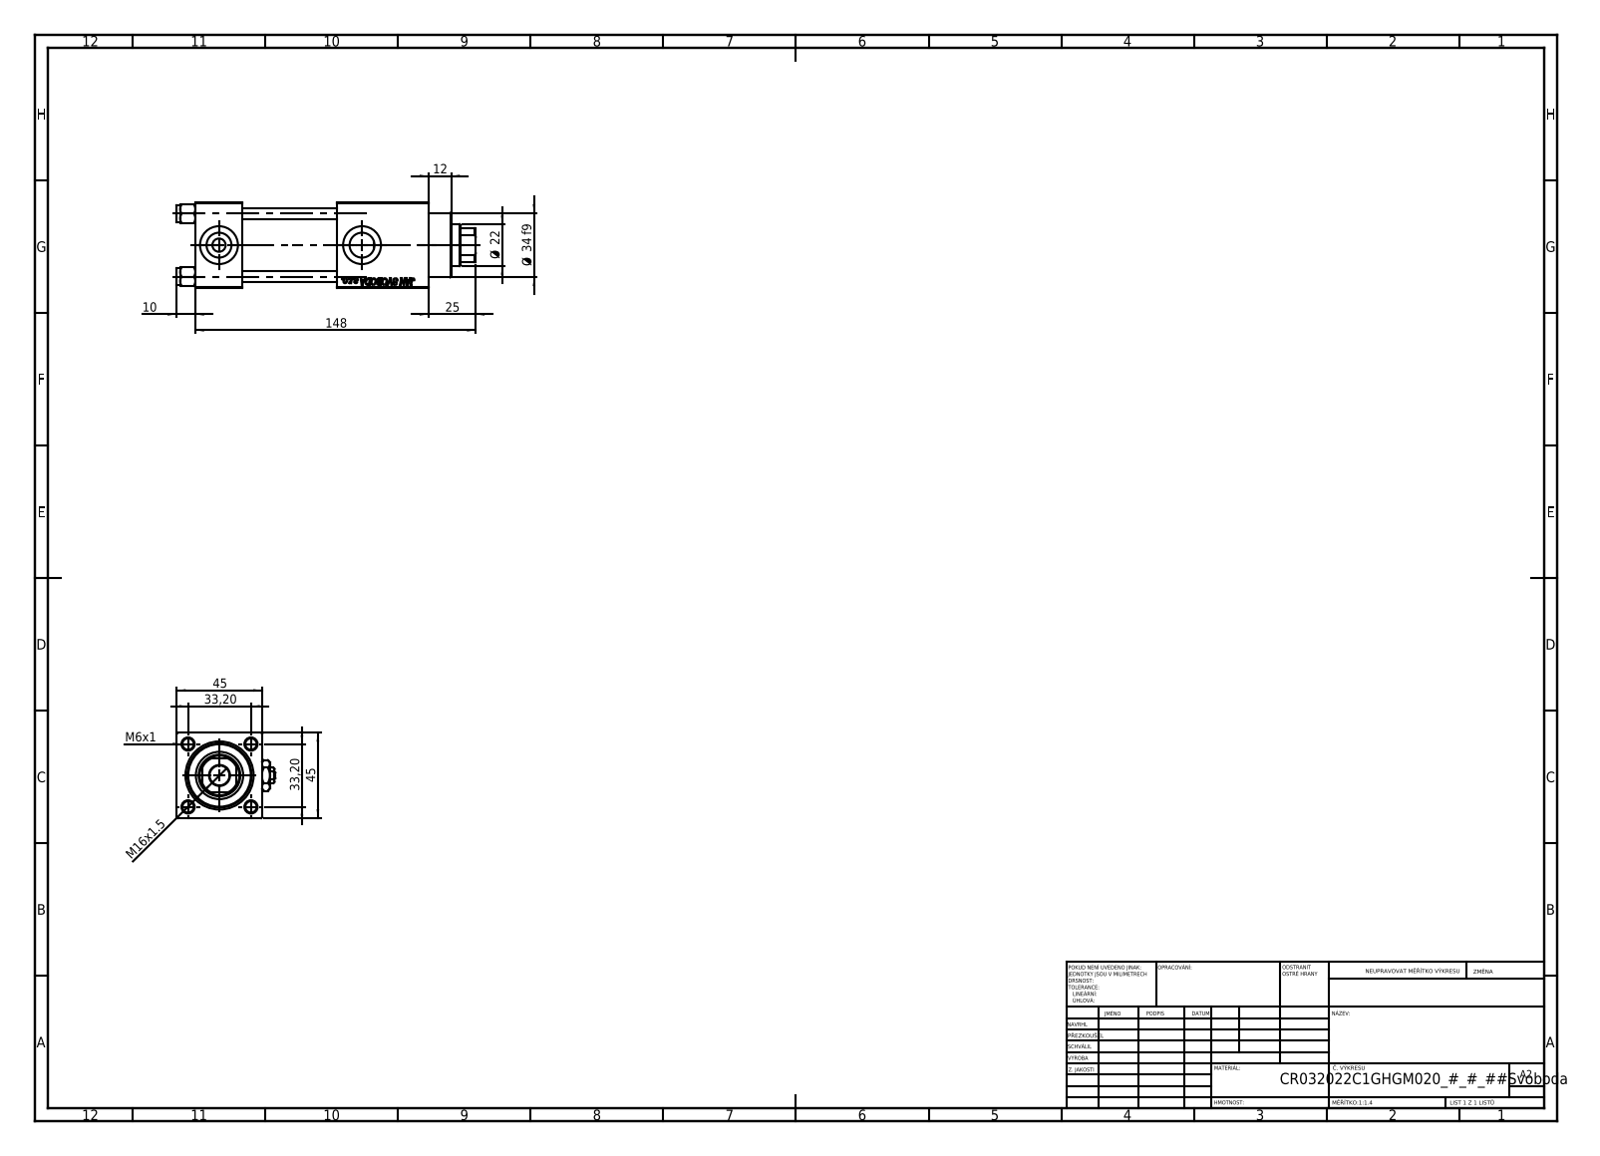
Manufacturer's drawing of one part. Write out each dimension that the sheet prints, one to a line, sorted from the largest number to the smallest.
148
45
45
Ø 34 f9
33,20
33,20
25
Ø 22
M16x1.5
12
10
M6x1
